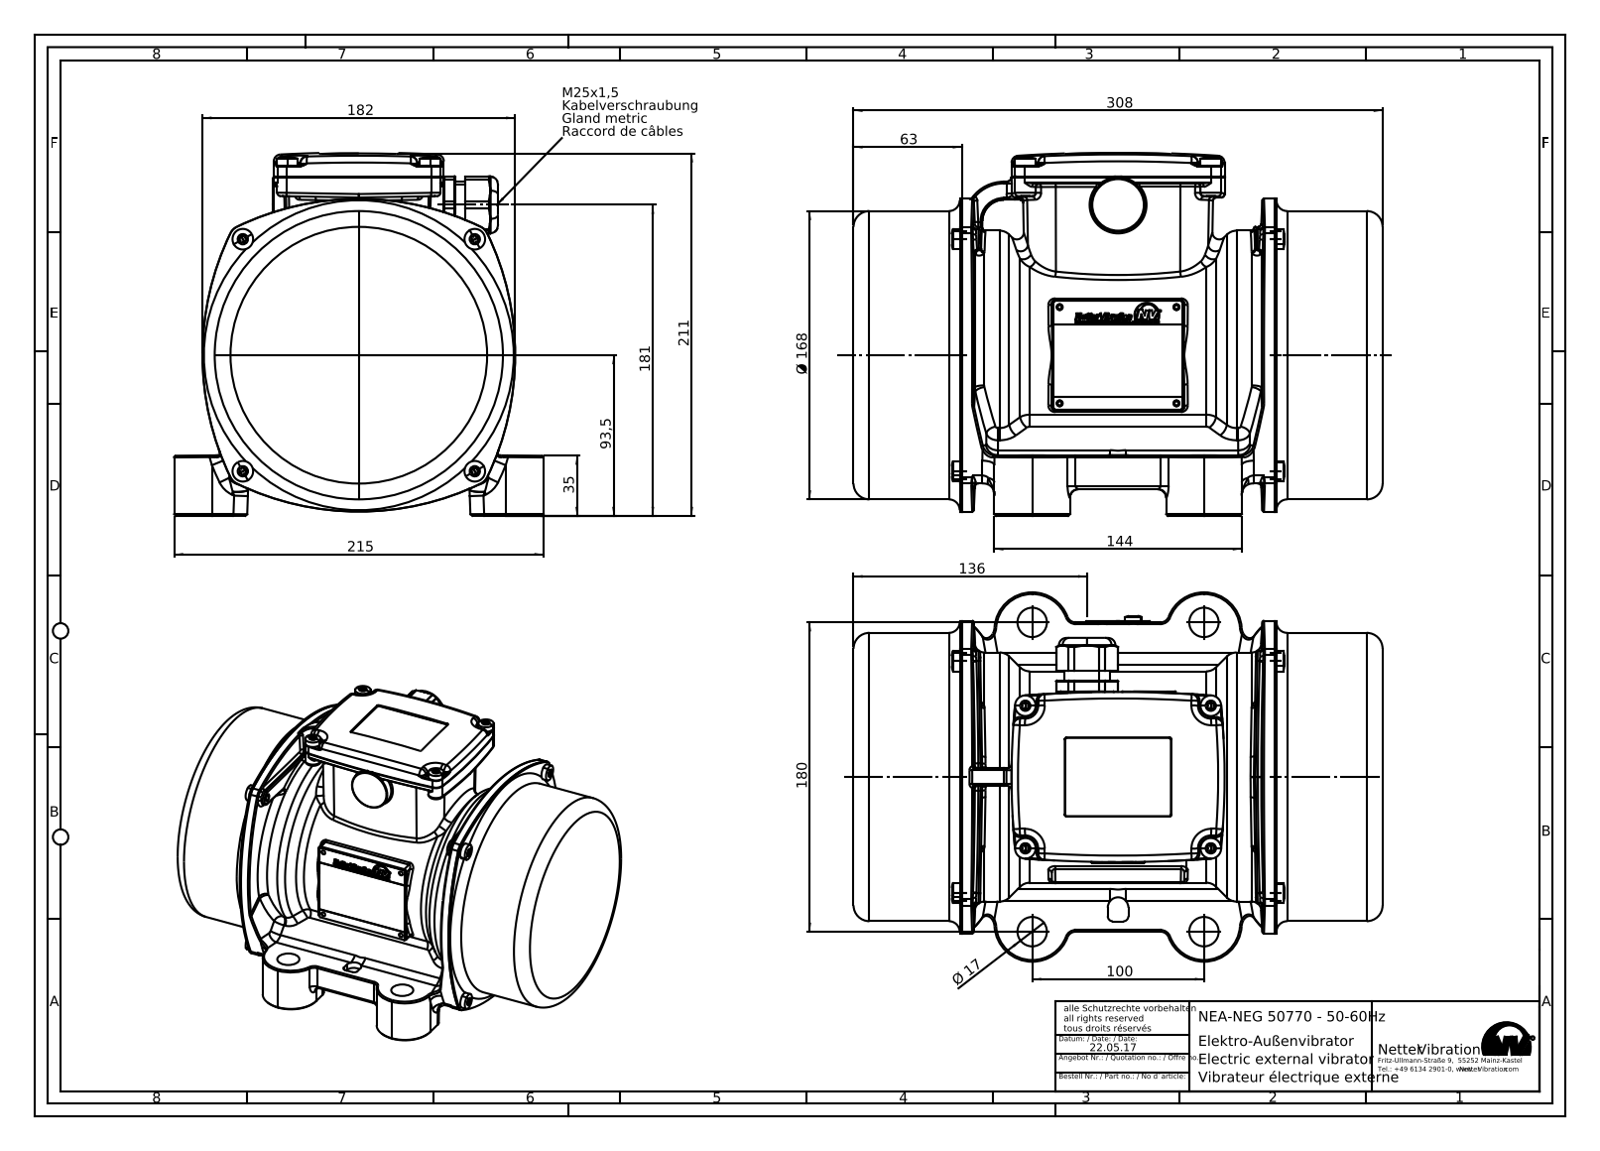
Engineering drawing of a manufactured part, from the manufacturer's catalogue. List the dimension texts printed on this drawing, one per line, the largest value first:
308
215
211
182
181
180
Ø 168
144
136
100
93,5
63
35
Ø 17
